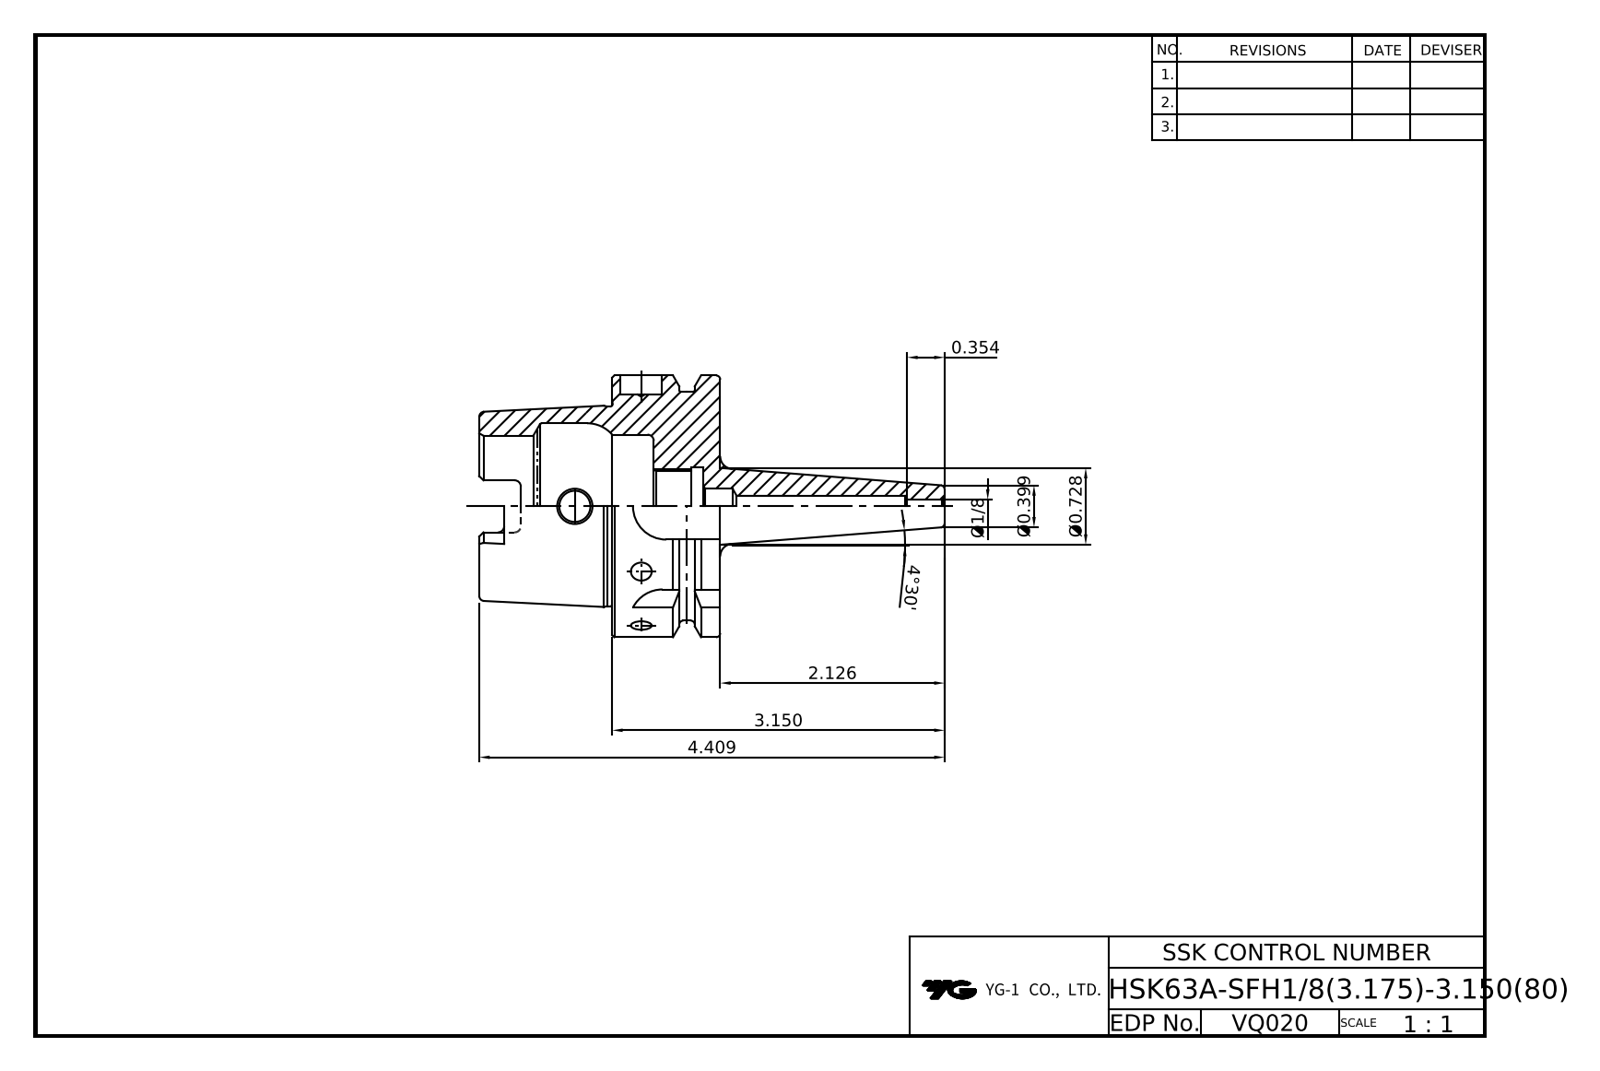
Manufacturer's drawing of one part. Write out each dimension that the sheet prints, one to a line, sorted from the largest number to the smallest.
4.409
4°30'
3.150
2.126
Ø0.728
Ø0.399
0.354
